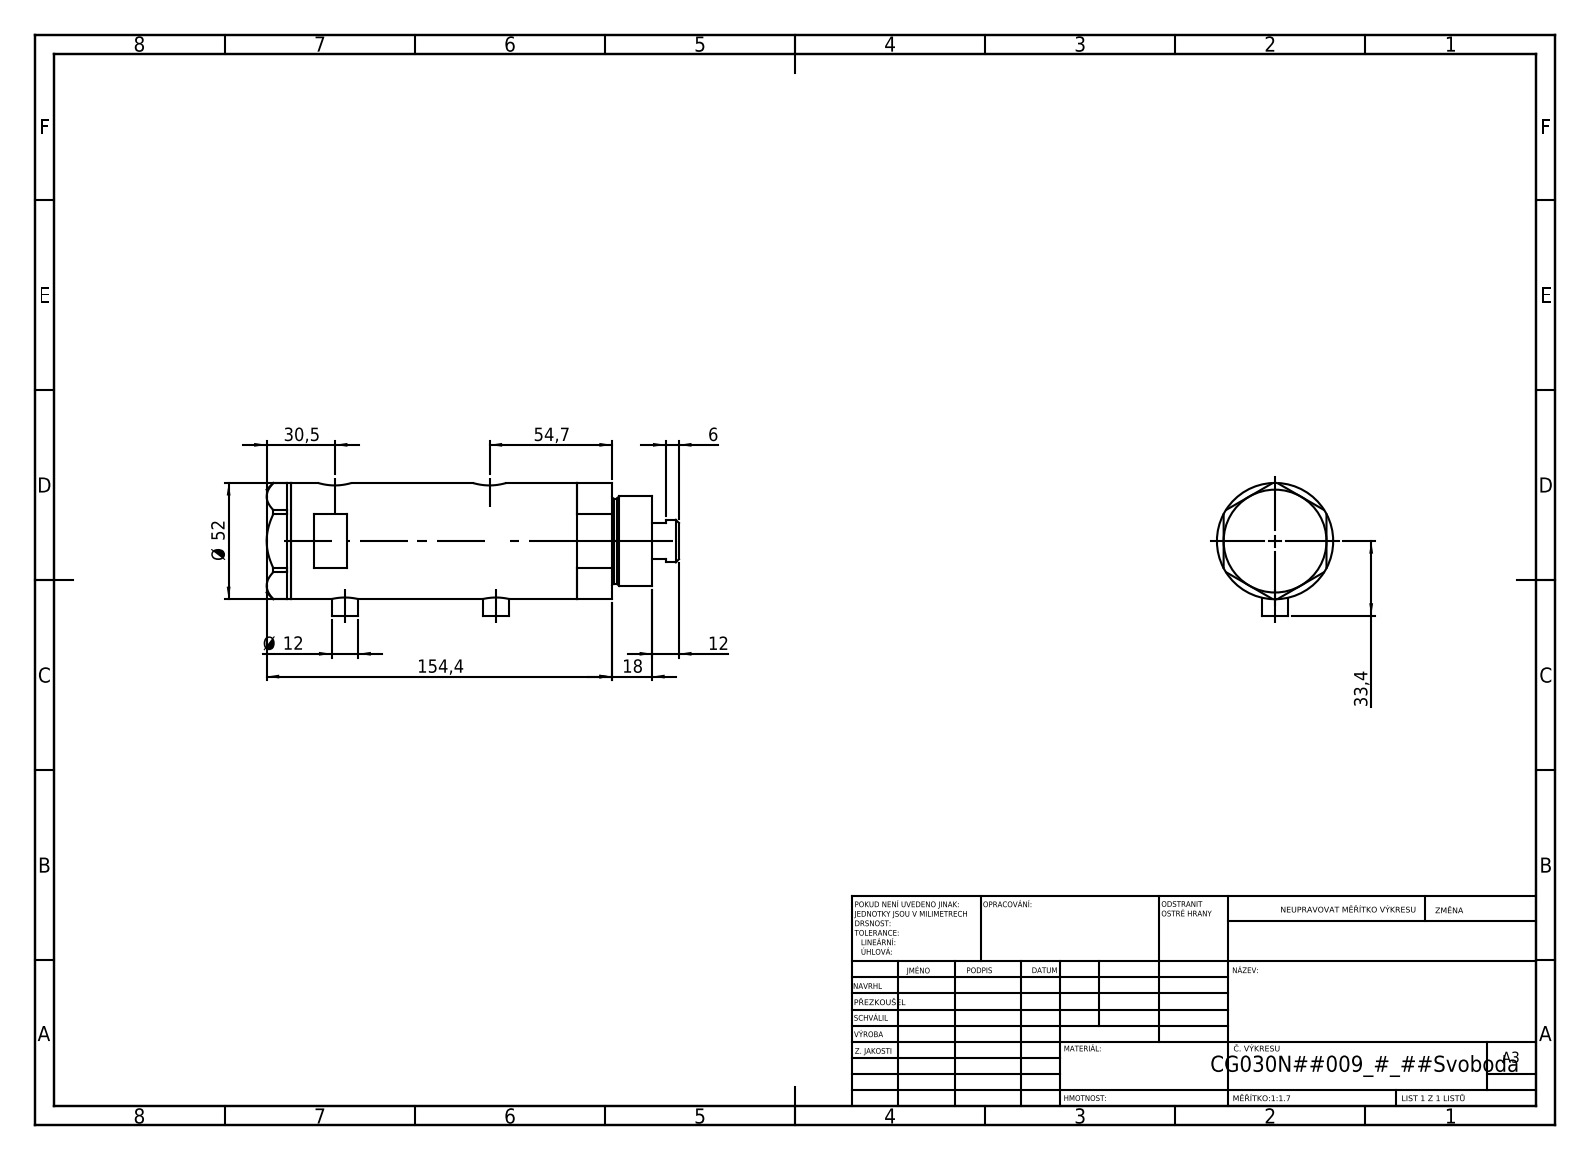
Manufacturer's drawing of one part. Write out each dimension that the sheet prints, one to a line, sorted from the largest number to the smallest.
154,4
54,7
Ø 52
33,4
30,5
18
12
Ø 12
6
